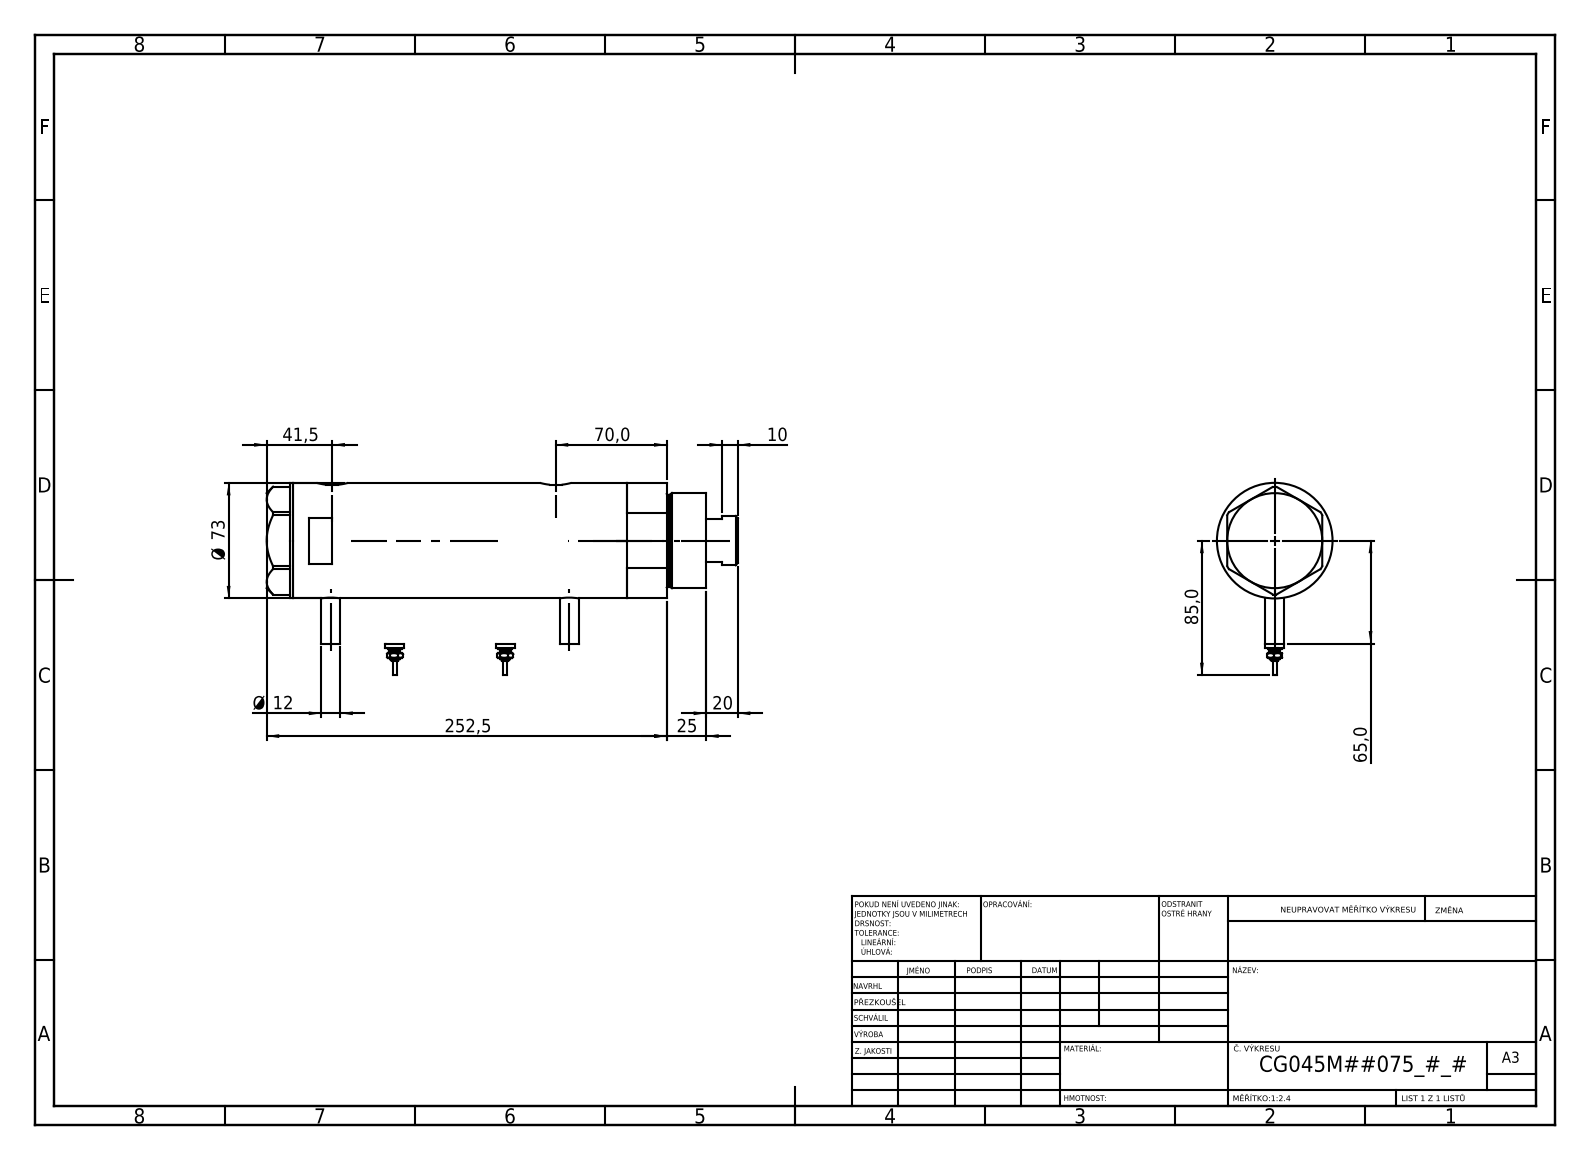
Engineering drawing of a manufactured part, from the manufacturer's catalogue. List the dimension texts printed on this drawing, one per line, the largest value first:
252,5
85,0
Ø 73
70,0
65,0
41,5
25
20
Ø 12
10
